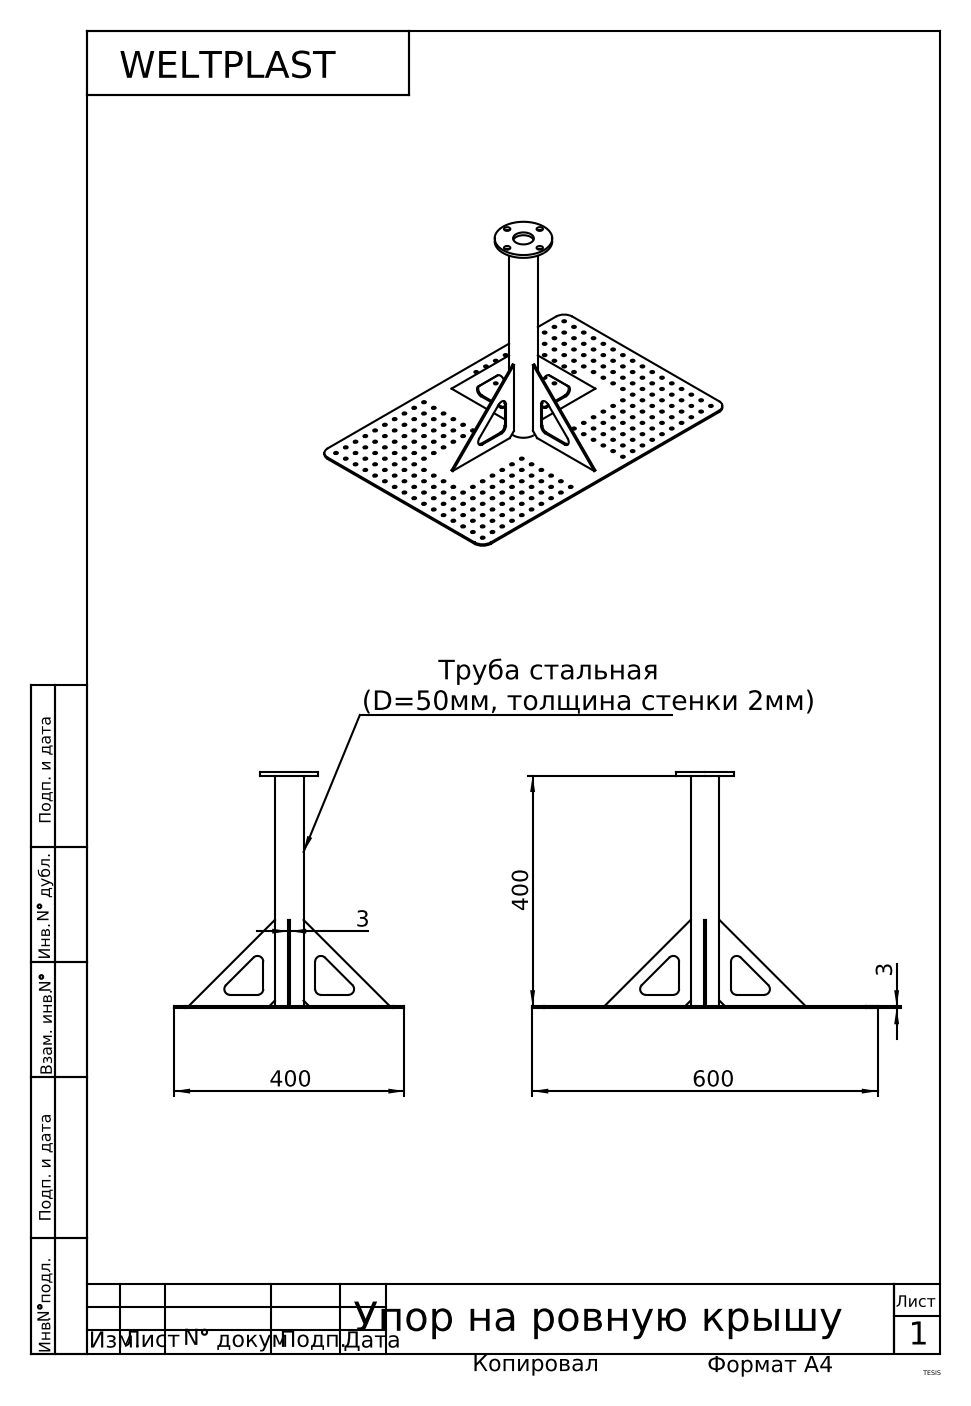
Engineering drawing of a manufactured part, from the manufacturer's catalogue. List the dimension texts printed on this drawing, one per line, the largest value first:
600
400
400
3
3
